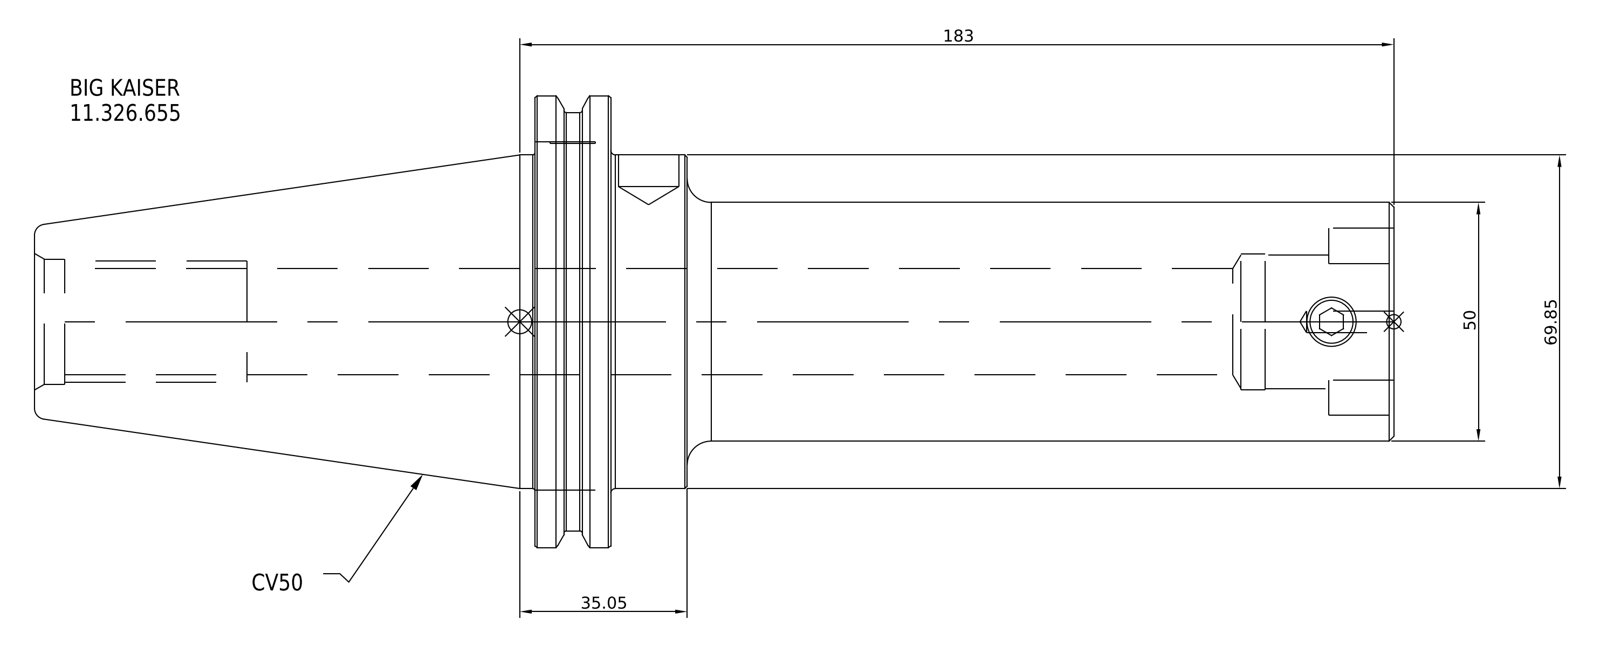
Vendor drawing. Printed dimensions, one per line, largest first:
183
69.85
50
35.05
